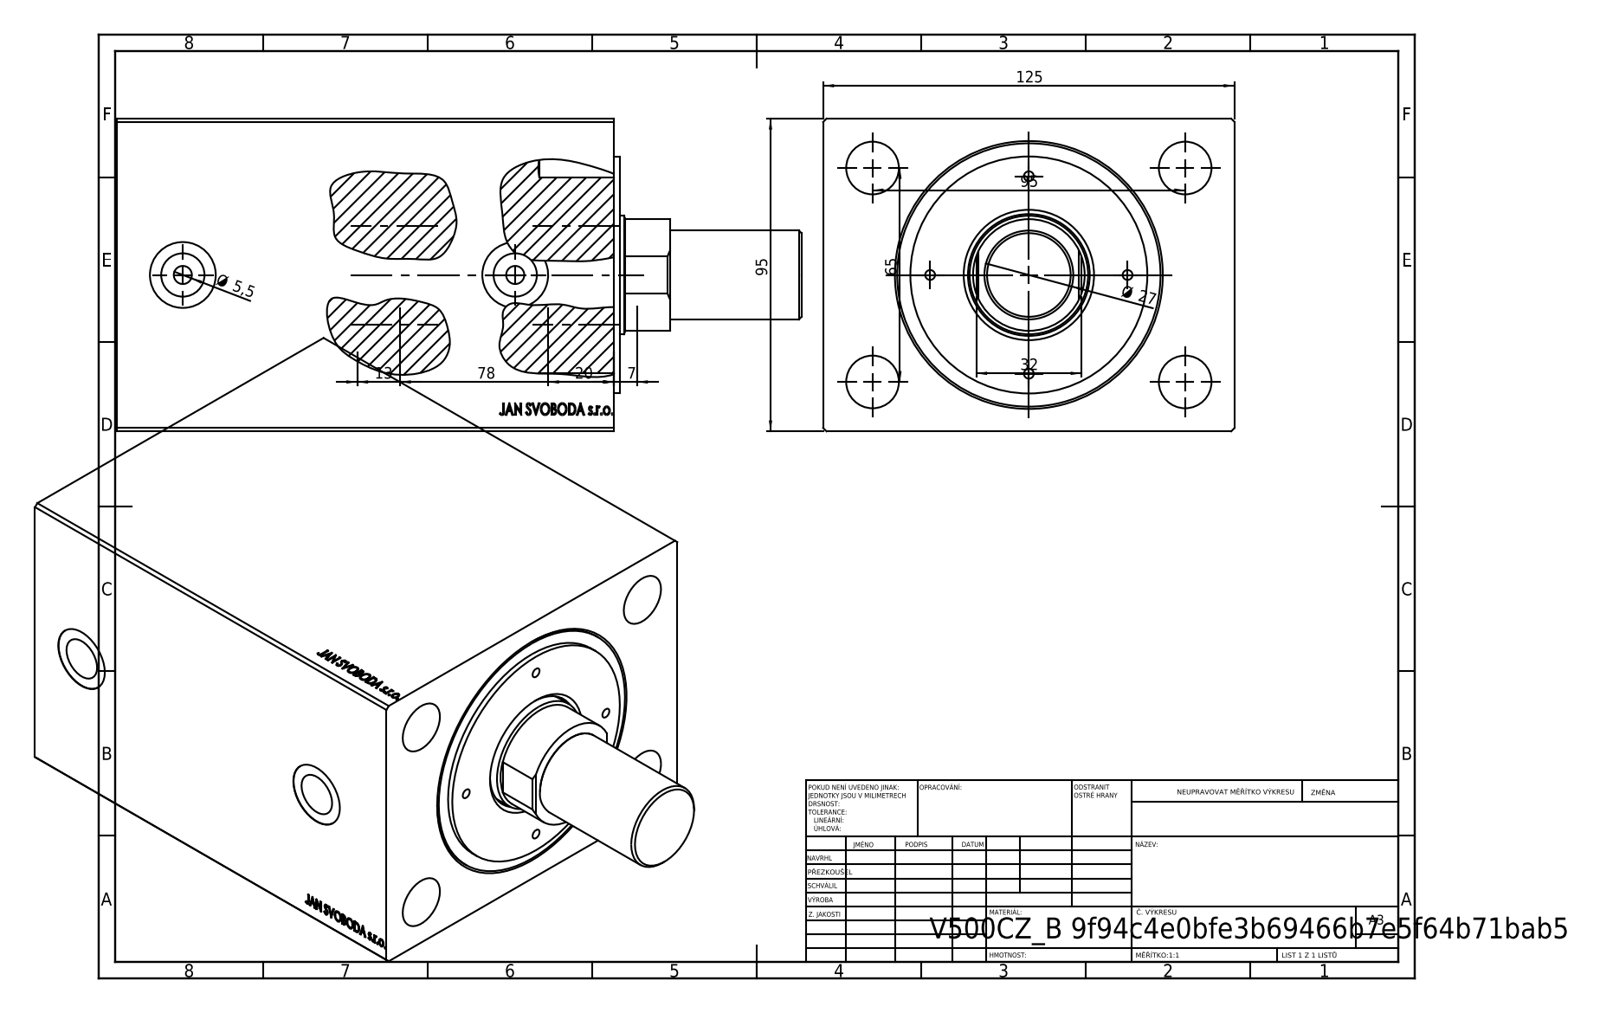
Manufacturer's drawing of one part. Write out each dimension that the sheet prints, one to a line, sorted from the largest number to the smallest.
125
95
95
78
65
32
Ø 27
20
13
7
Ø 5,5
